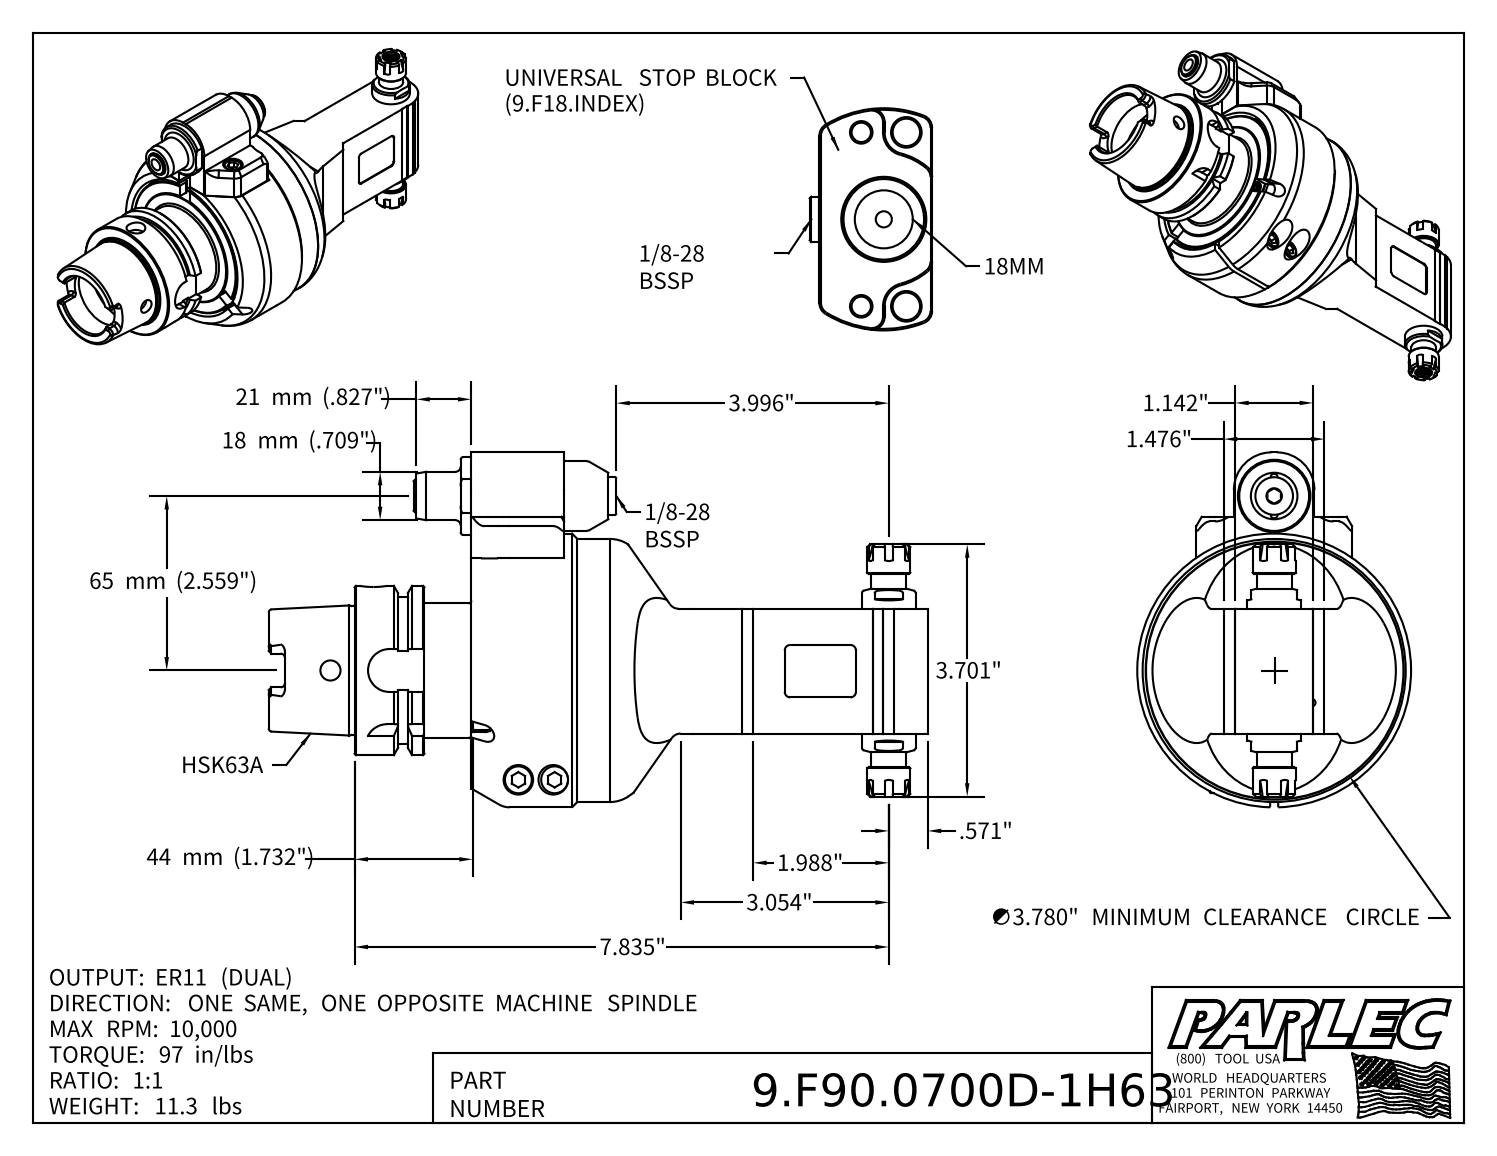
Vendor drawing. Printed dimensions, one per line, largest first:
65 mm (2.559")
44 mm (1.732")
21 mm (.827")
18 mm (.709")
7.835"
3.996"
∅3.780" MINIMUM CLEARANCE CIRCLE
3.701"
3.054"
1.988"
1.476"
1.142"
.571"
